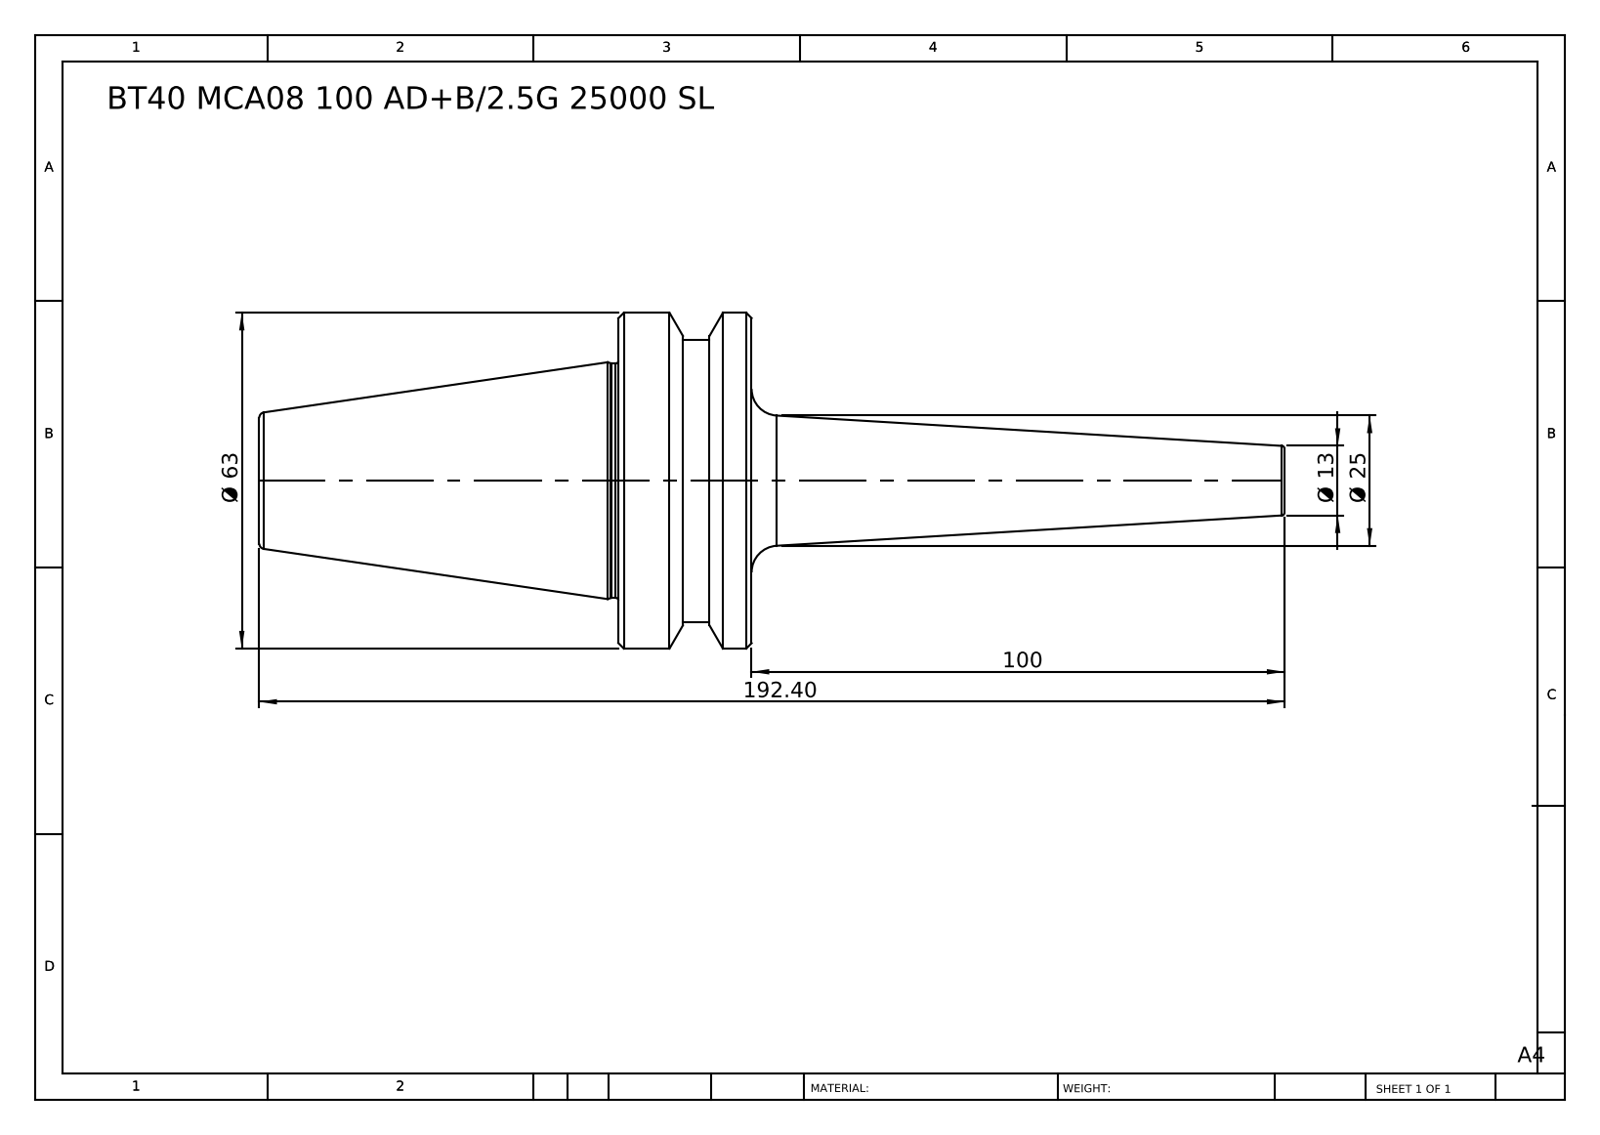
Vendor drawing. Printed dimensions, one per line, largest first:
192.40
100
Ø 63
Ø 25
Ø 13
